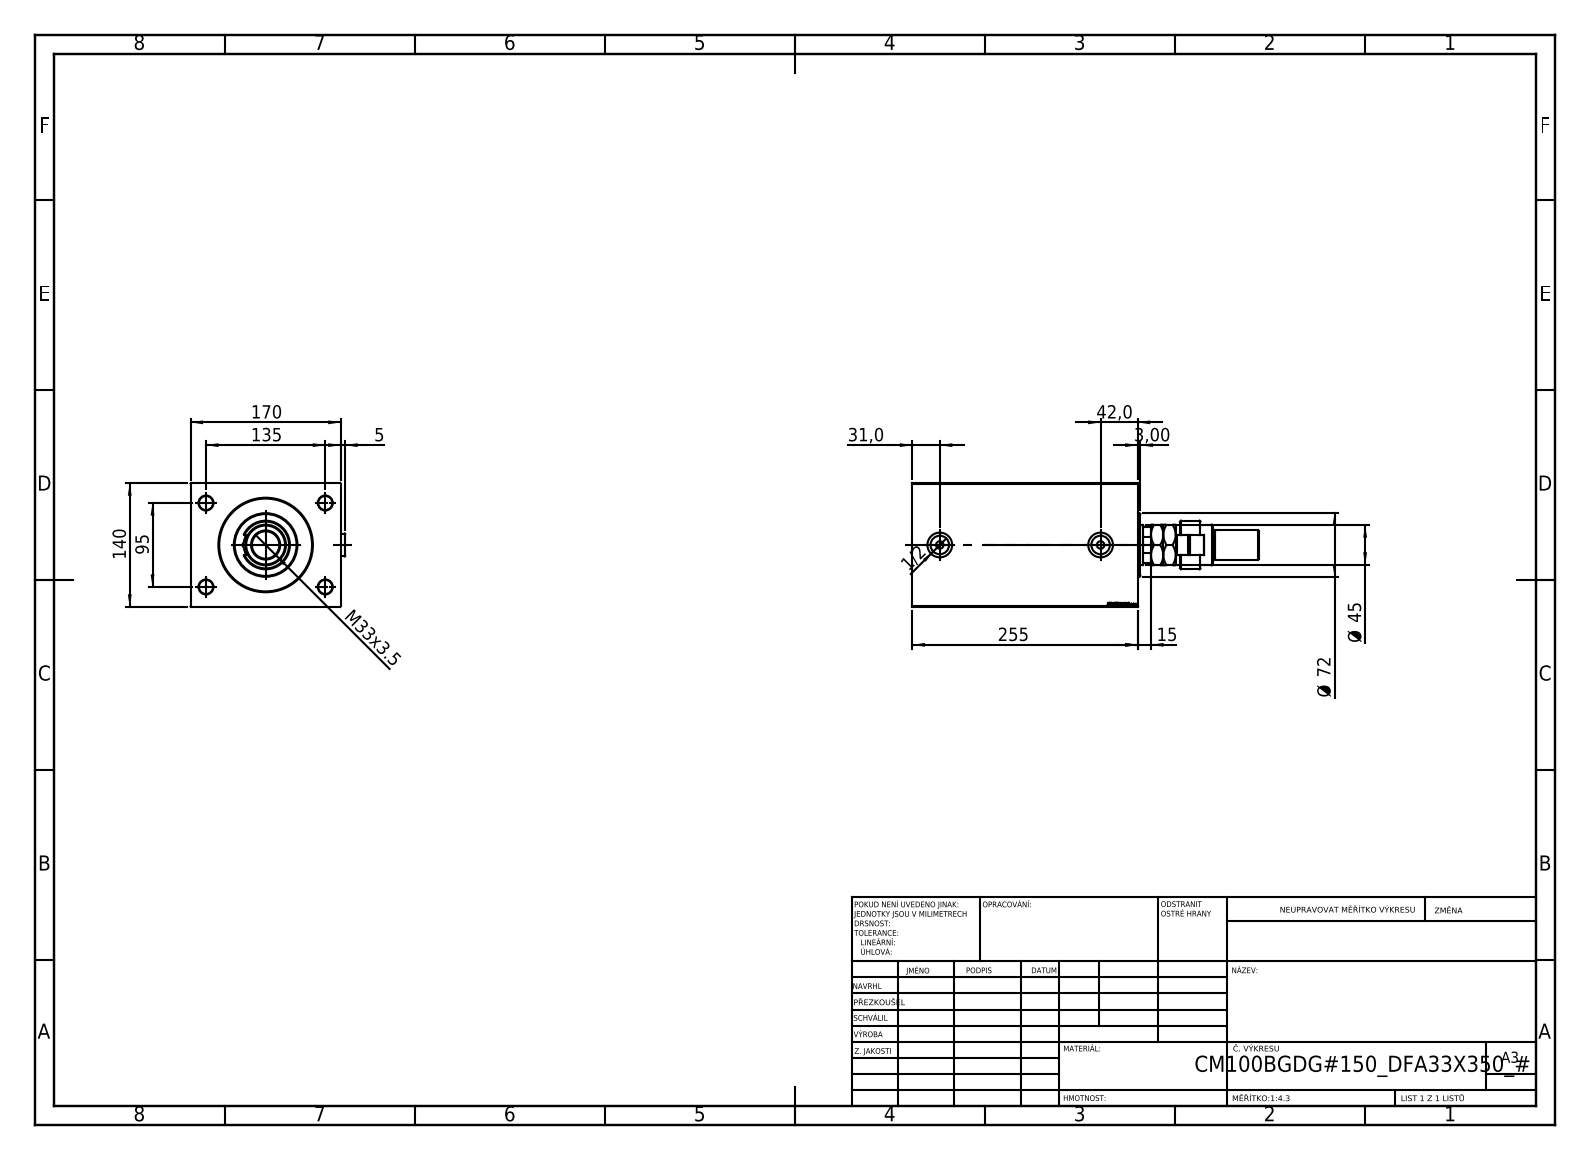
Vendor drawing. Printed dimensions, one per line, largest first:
255
170
140
135
95
Ø 72
Ø 45
42,0
M33x3.5
31,0
15
5
3,00
1/2
